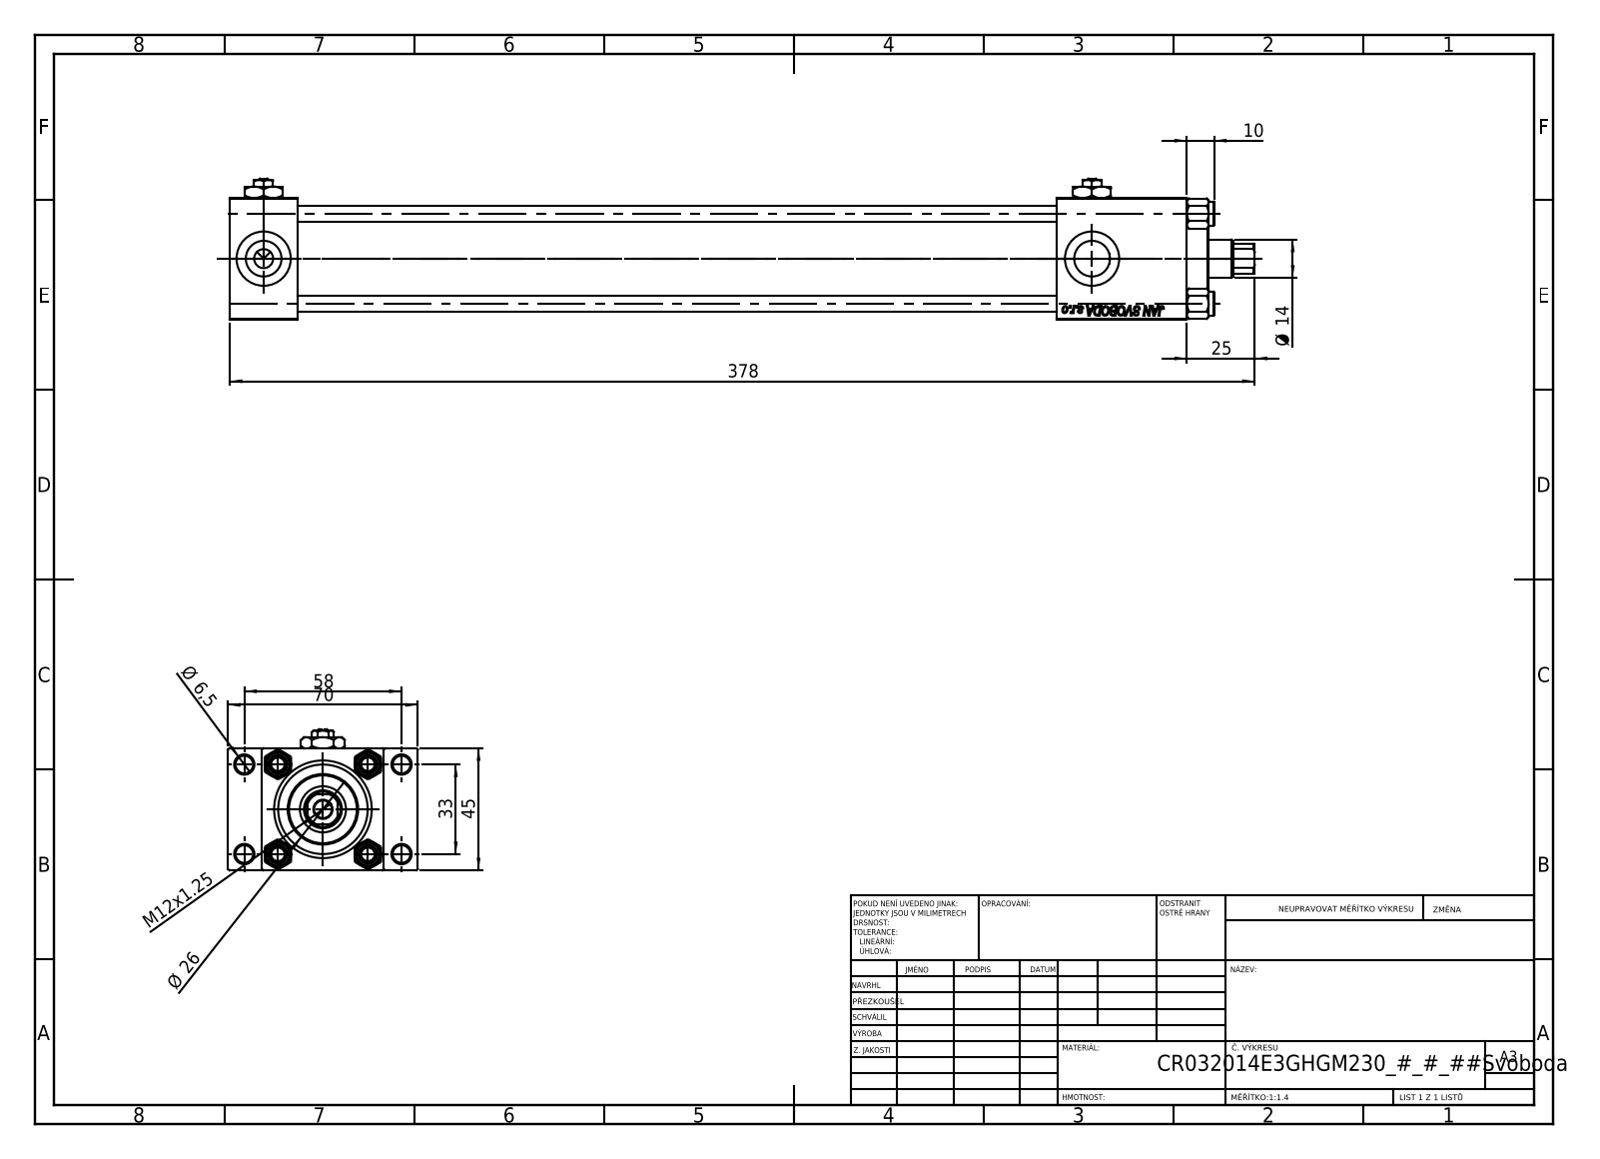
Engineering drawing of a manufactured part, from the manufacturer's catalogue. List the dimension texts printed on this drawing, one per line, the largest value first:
378
70
58
45
33
Ø 26
25
Ø 14
M12x1.25
10
Ø 6,5
